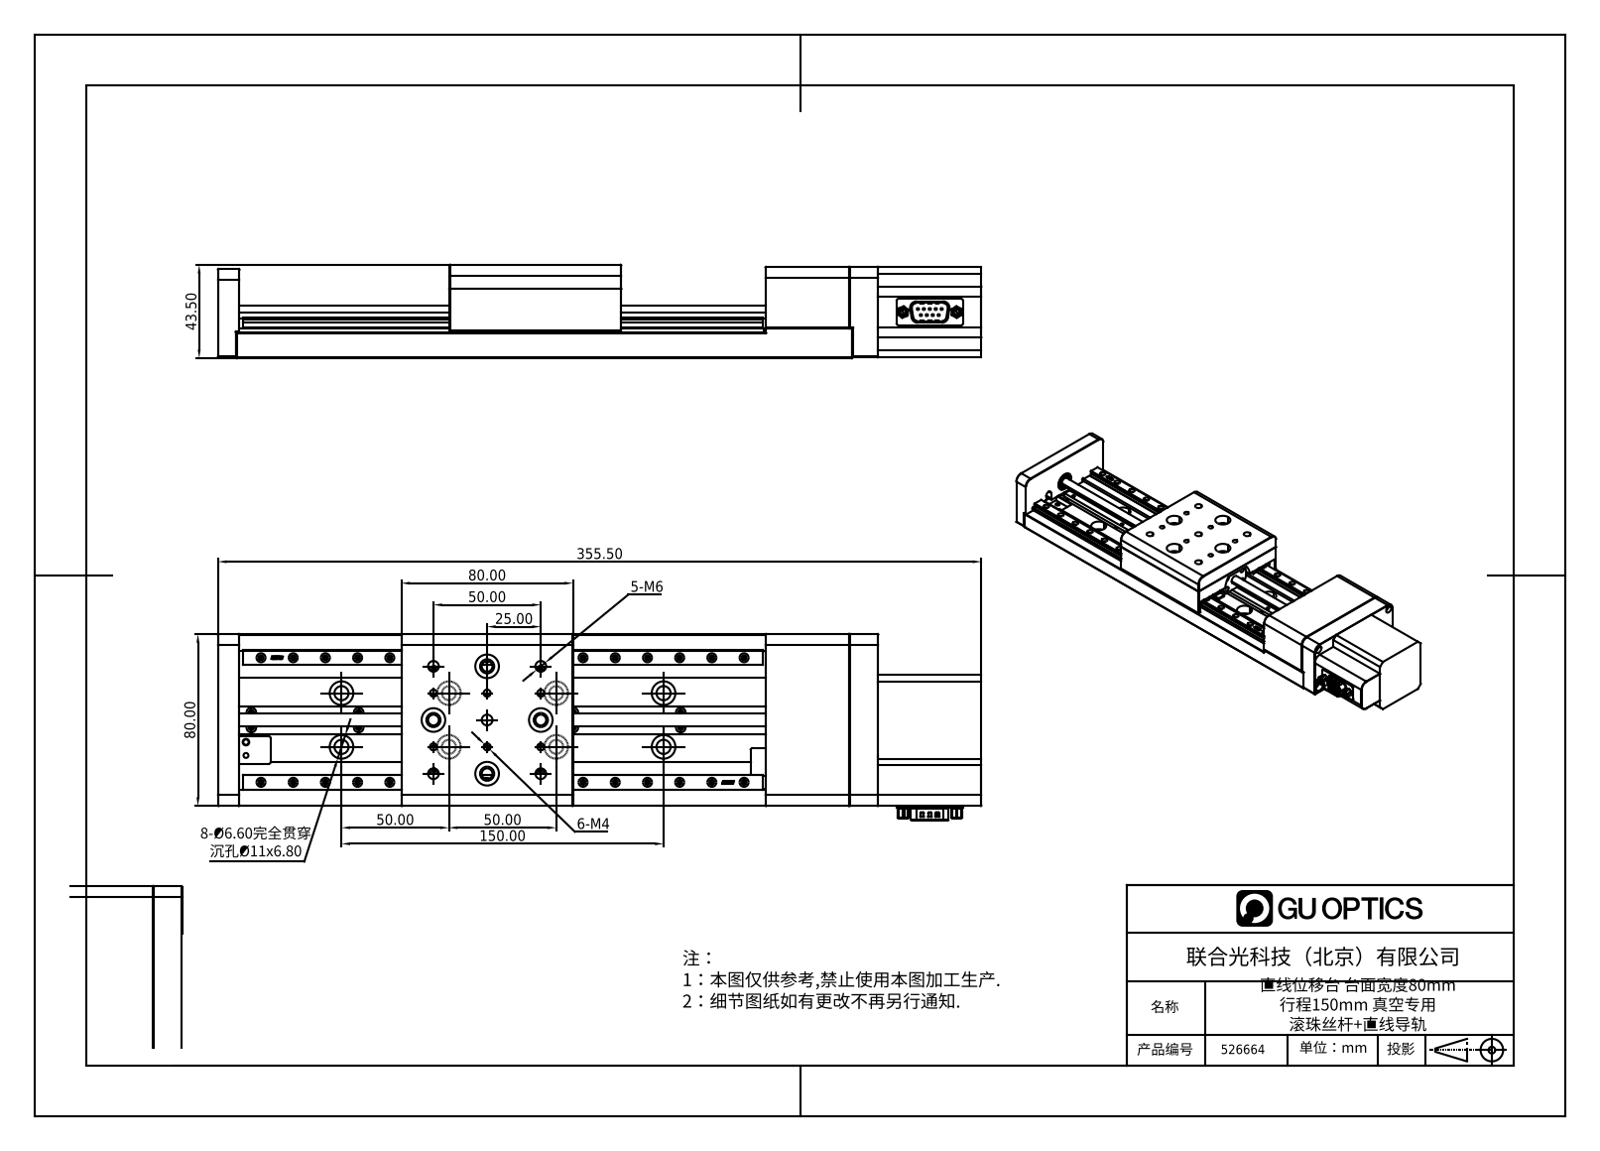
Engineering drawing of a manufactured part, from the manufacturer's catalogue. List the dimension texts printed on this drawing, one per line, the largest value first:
355.50
150.00
80.00
80.00
50.00
50.00
50.00
43.50
25.00
8-Ø6.60完全贯穿 沉孔Ø11x6.80
5-M6
6-M4
